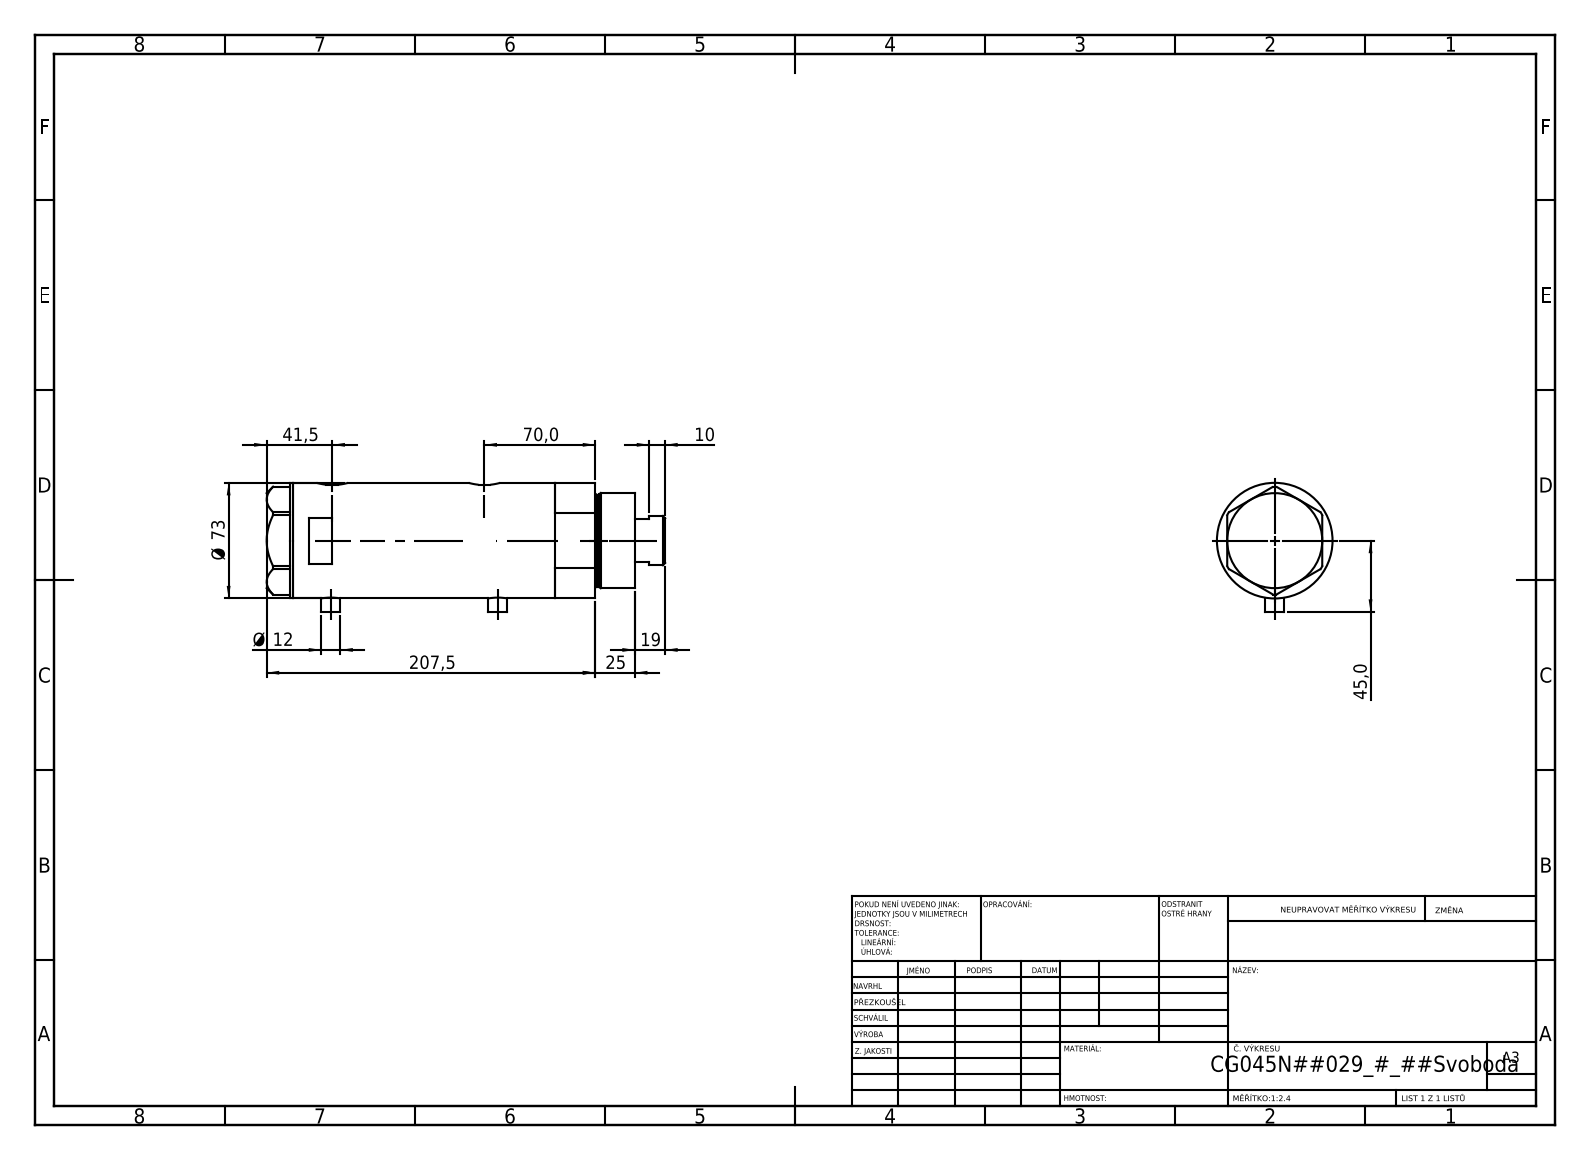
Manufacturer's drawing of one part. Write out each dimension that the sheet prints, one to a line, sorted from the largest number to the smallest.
207,5
Ø 73
70,0
45,0
41,5
25
19
Ø 12
10
